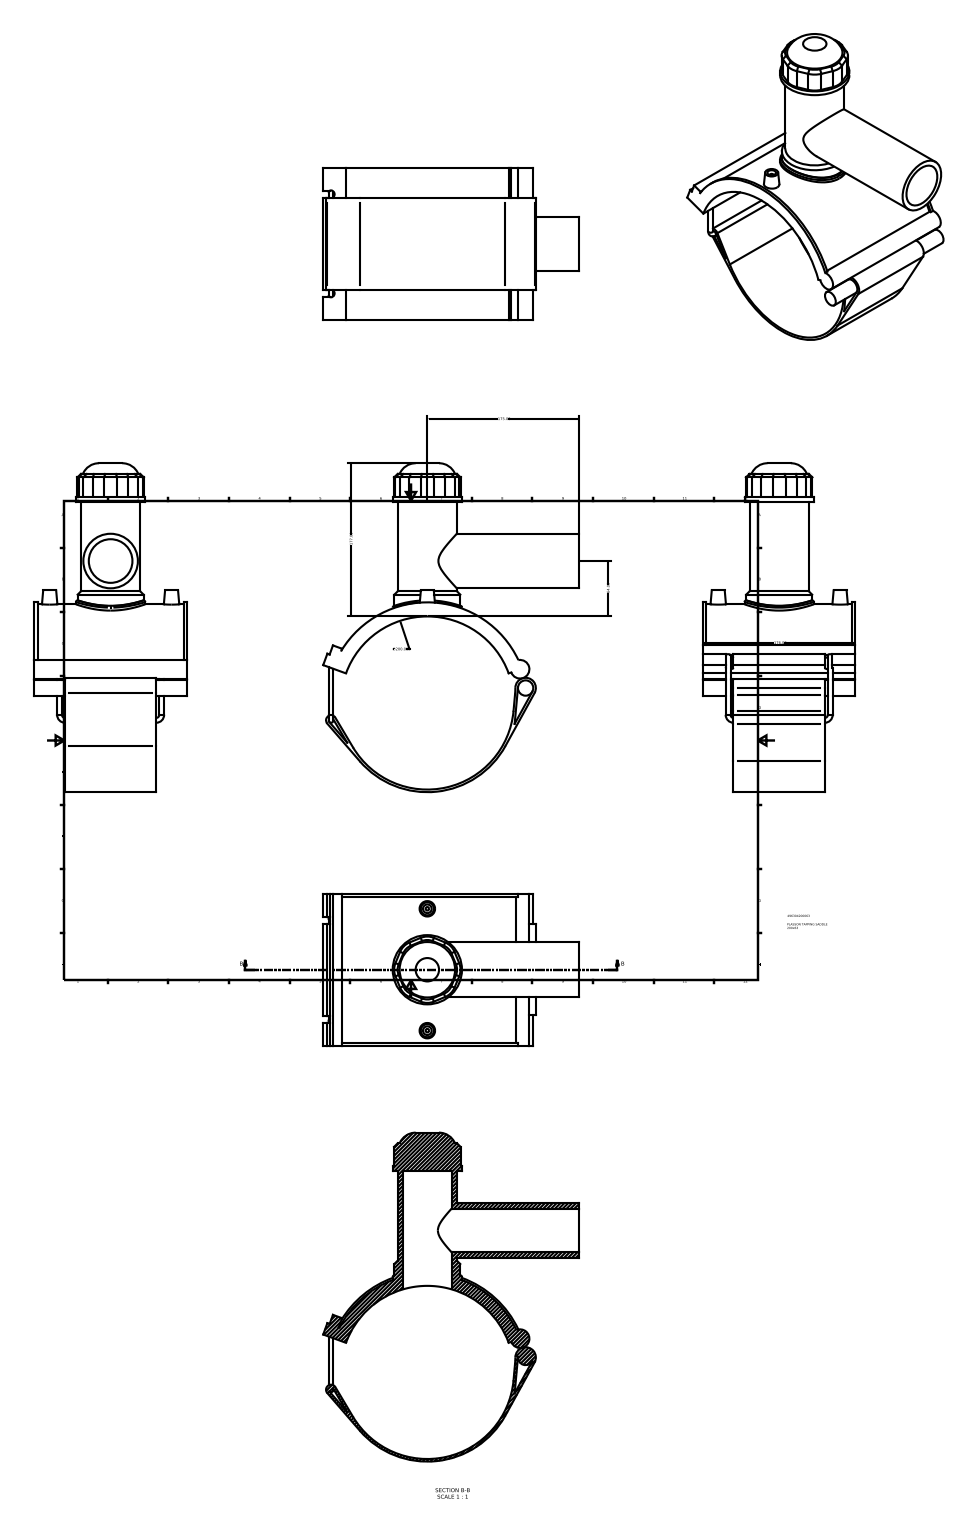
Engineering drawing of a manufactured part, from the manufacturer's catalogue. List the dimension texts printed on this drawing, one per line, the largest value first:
∅200.00
177.00
176.00
175.00
64.00
